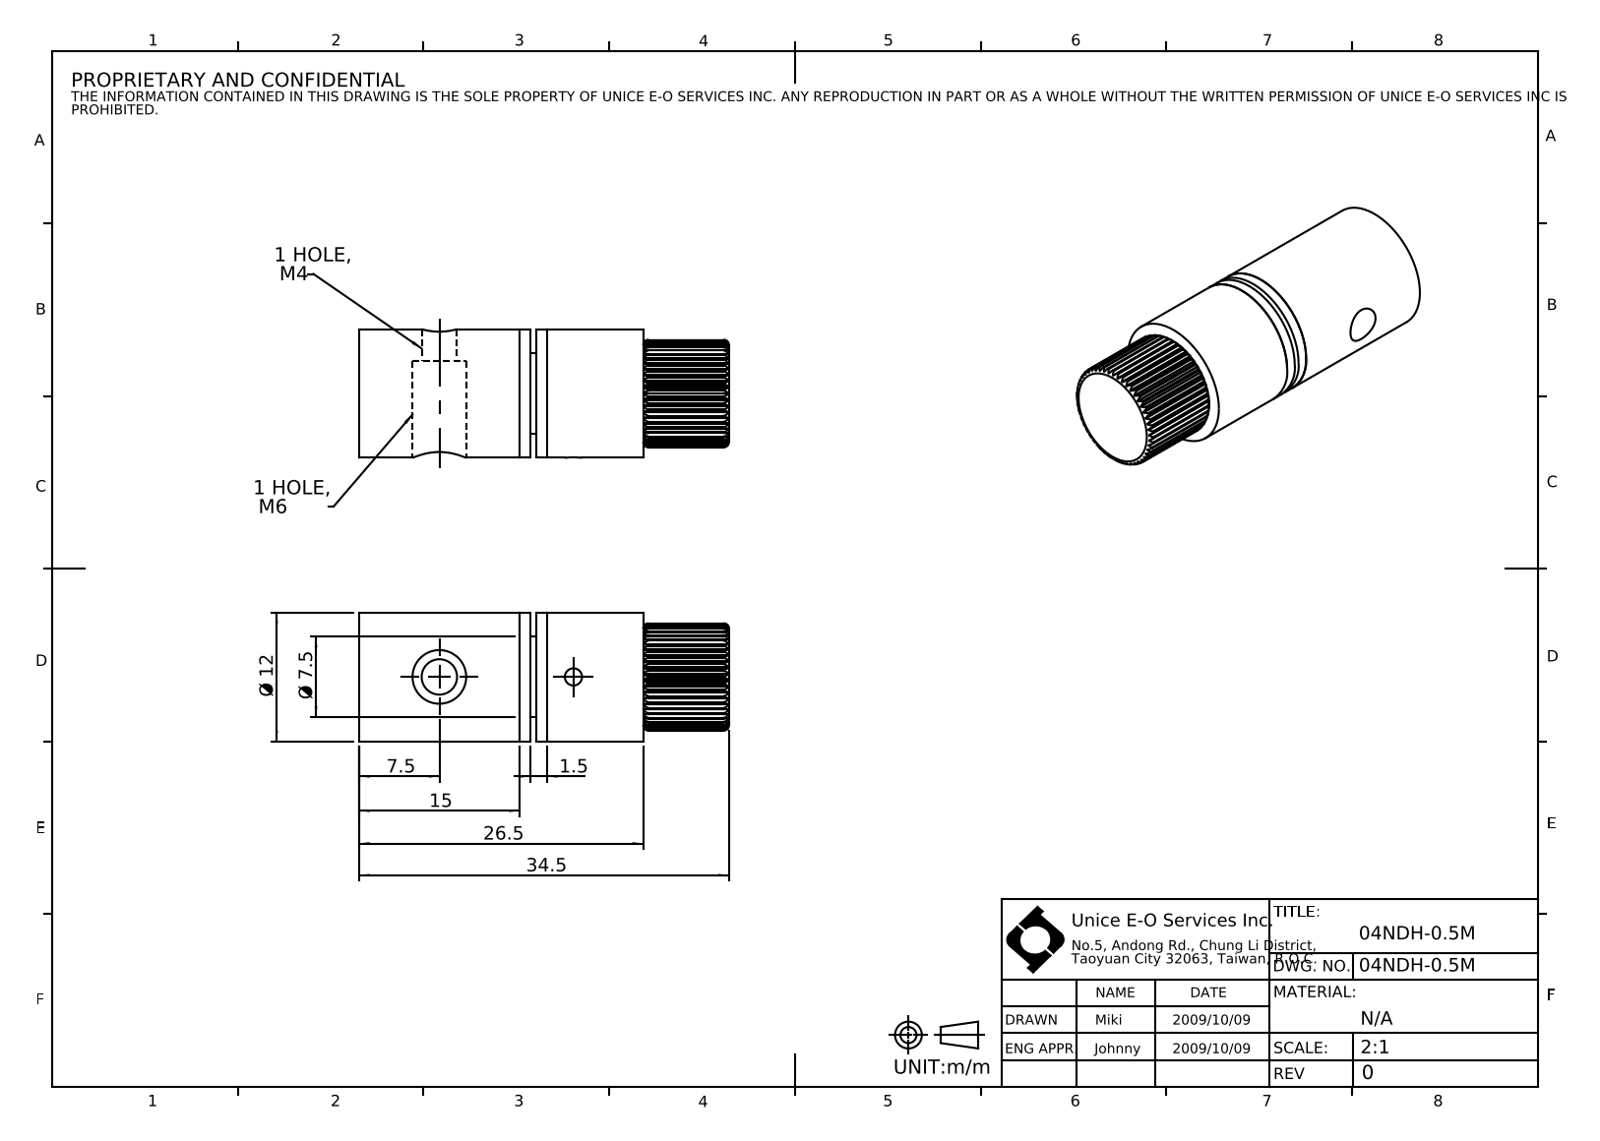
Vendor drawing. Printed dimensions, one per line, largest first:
34.5
26.5
15
Ø 12
7.5
Ø 7.5
1.5
